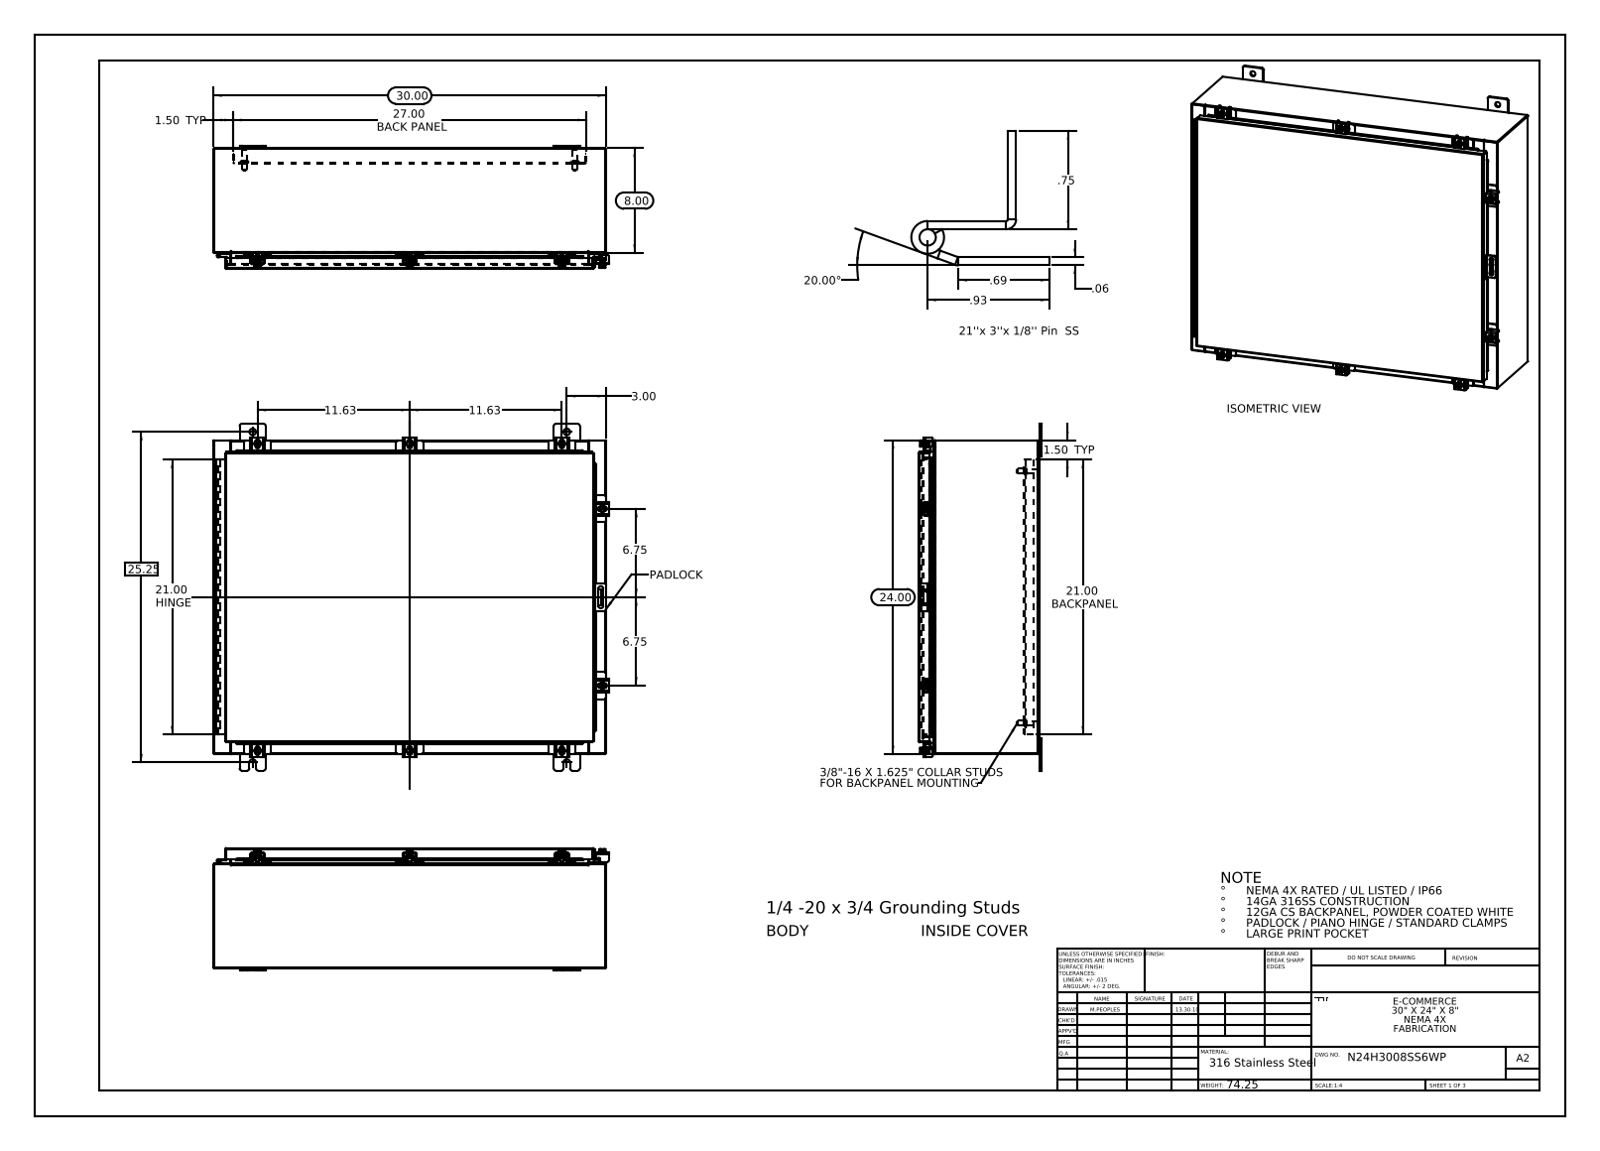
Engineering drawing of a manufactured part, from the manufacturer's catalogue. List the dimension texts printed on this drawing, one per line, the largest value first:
30.00
27.00 BACK PANEL
25.25
24.00
21.00 HINGE
21.00 BACKPANEL
20.00°
11.63
11.63
8.00
6.75
6.75
3.00
1.50 TYP
1.50 TYP
.93
.75
.69
.06
